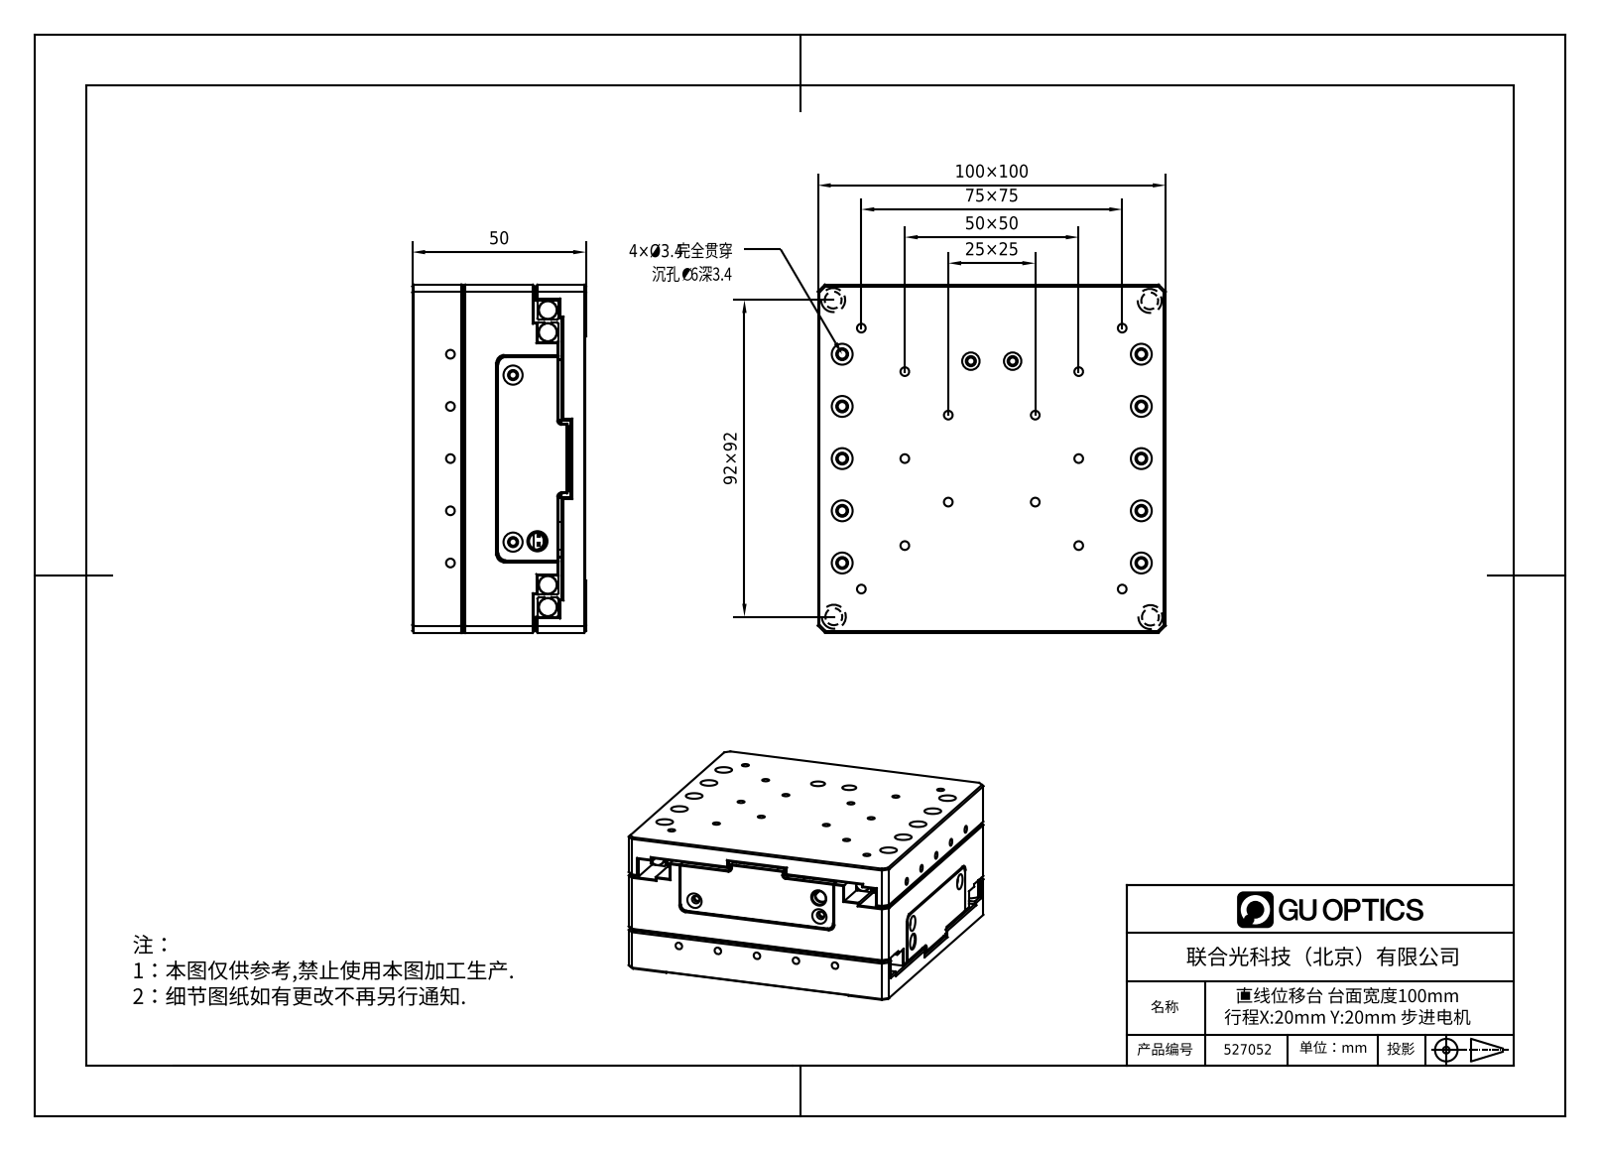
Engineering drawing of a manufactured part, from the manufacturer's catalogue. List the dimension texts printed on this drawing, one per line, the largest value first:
100×100
92×92
75×75
50×50
50
25×25
